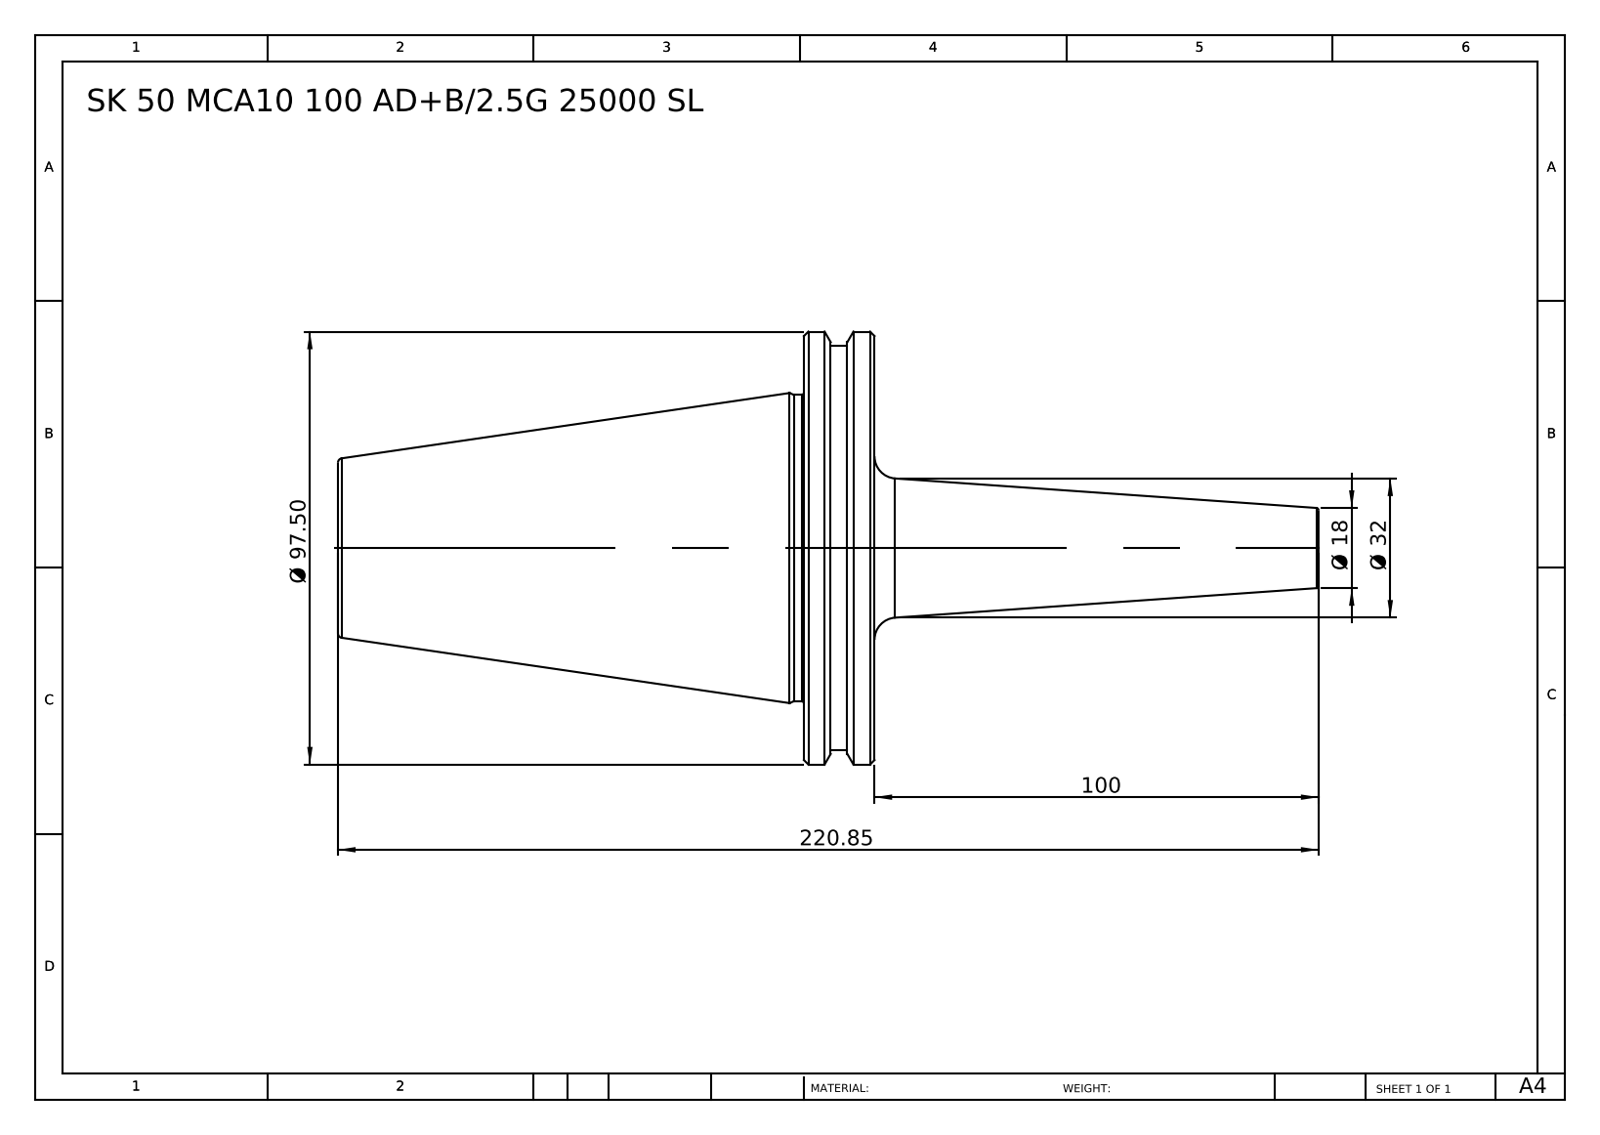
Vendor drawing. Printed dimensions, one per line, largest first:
220.85
100
Ø 97.50
Ø 32
Ø 18
